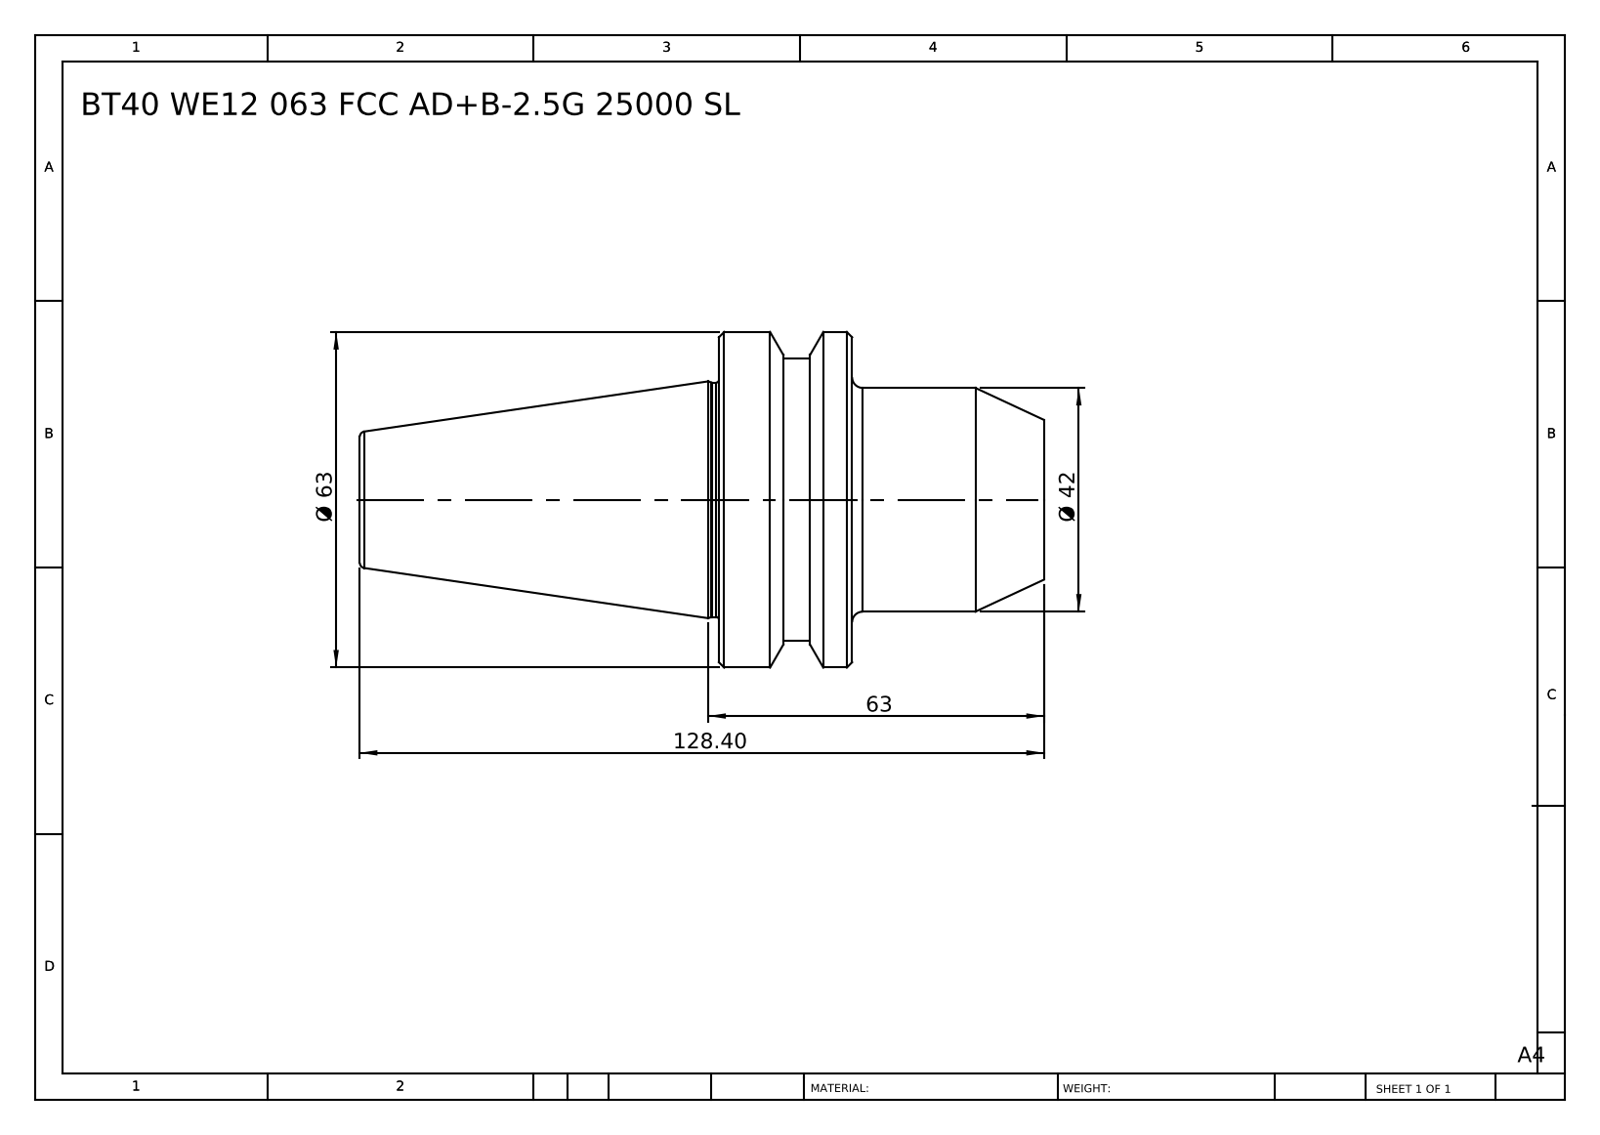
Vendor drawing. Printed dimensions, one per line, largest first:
128.40
63
Ø 63
Ø 42
